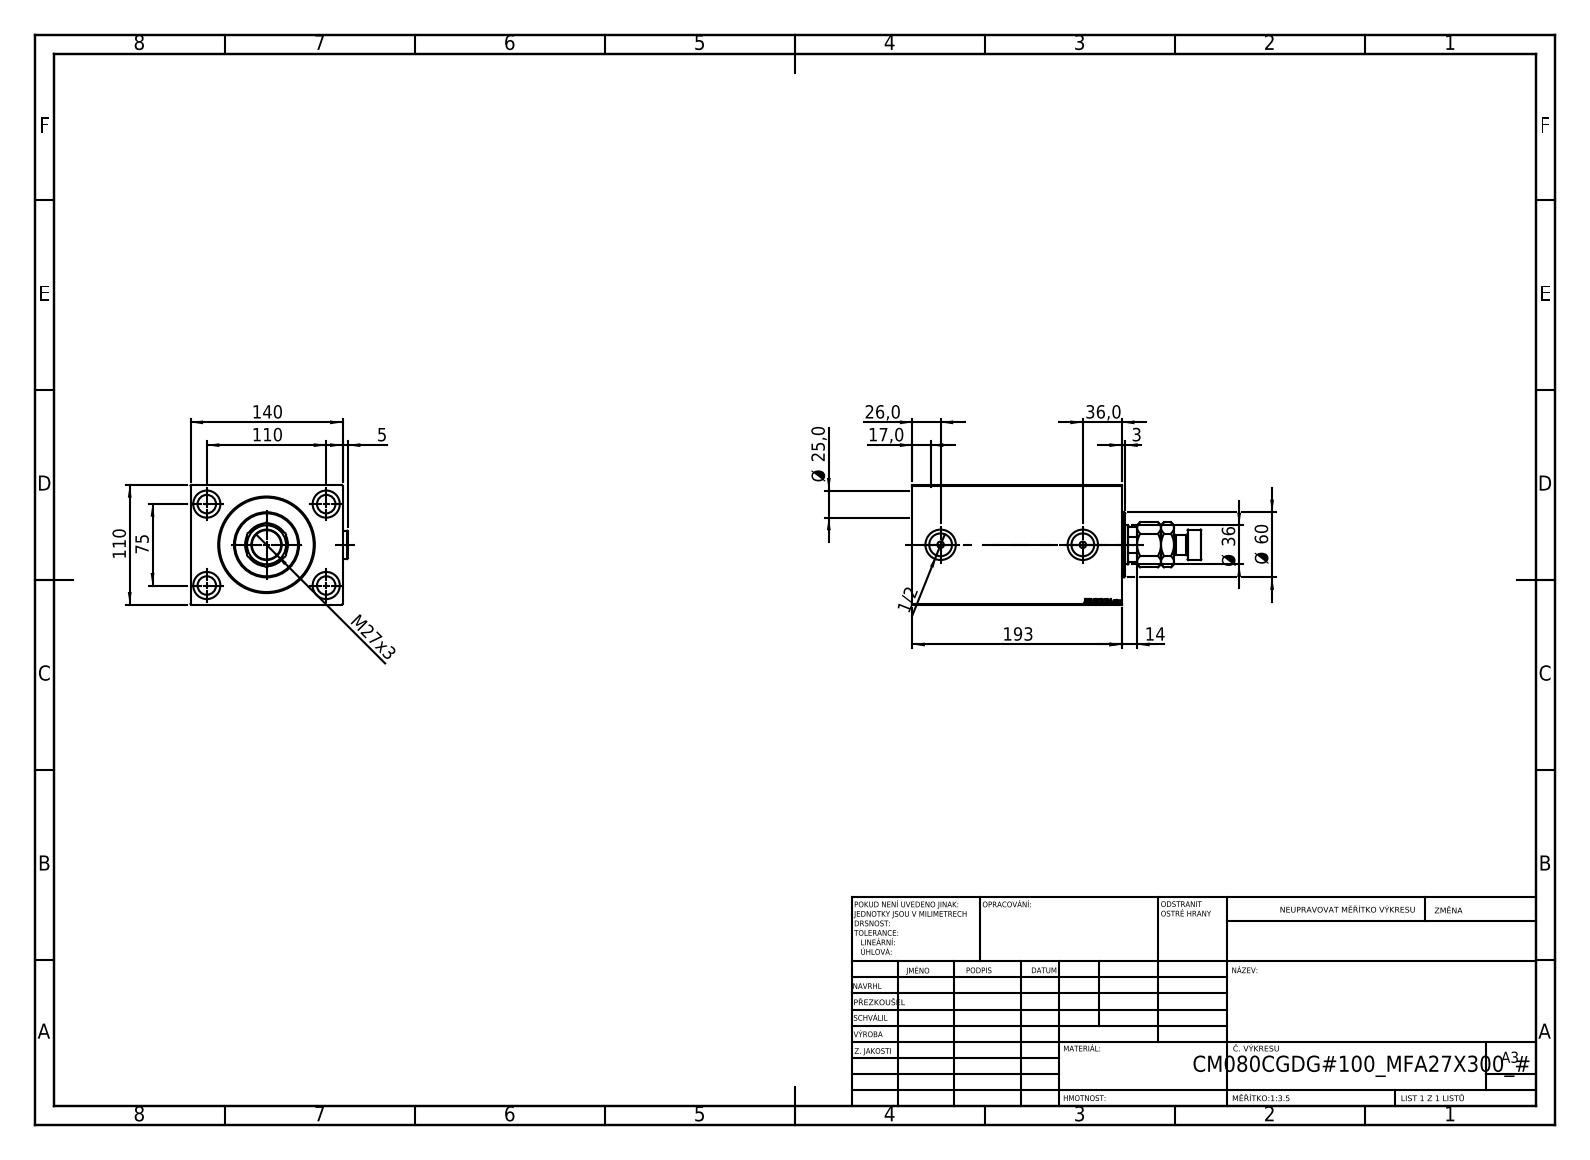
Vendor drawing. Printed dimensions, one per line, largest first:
193
140
110
110
75
Ø 60
Ø 36
36,0
M27x3
26,0
Ø 25,0
17,0
14
5
3
1/2
